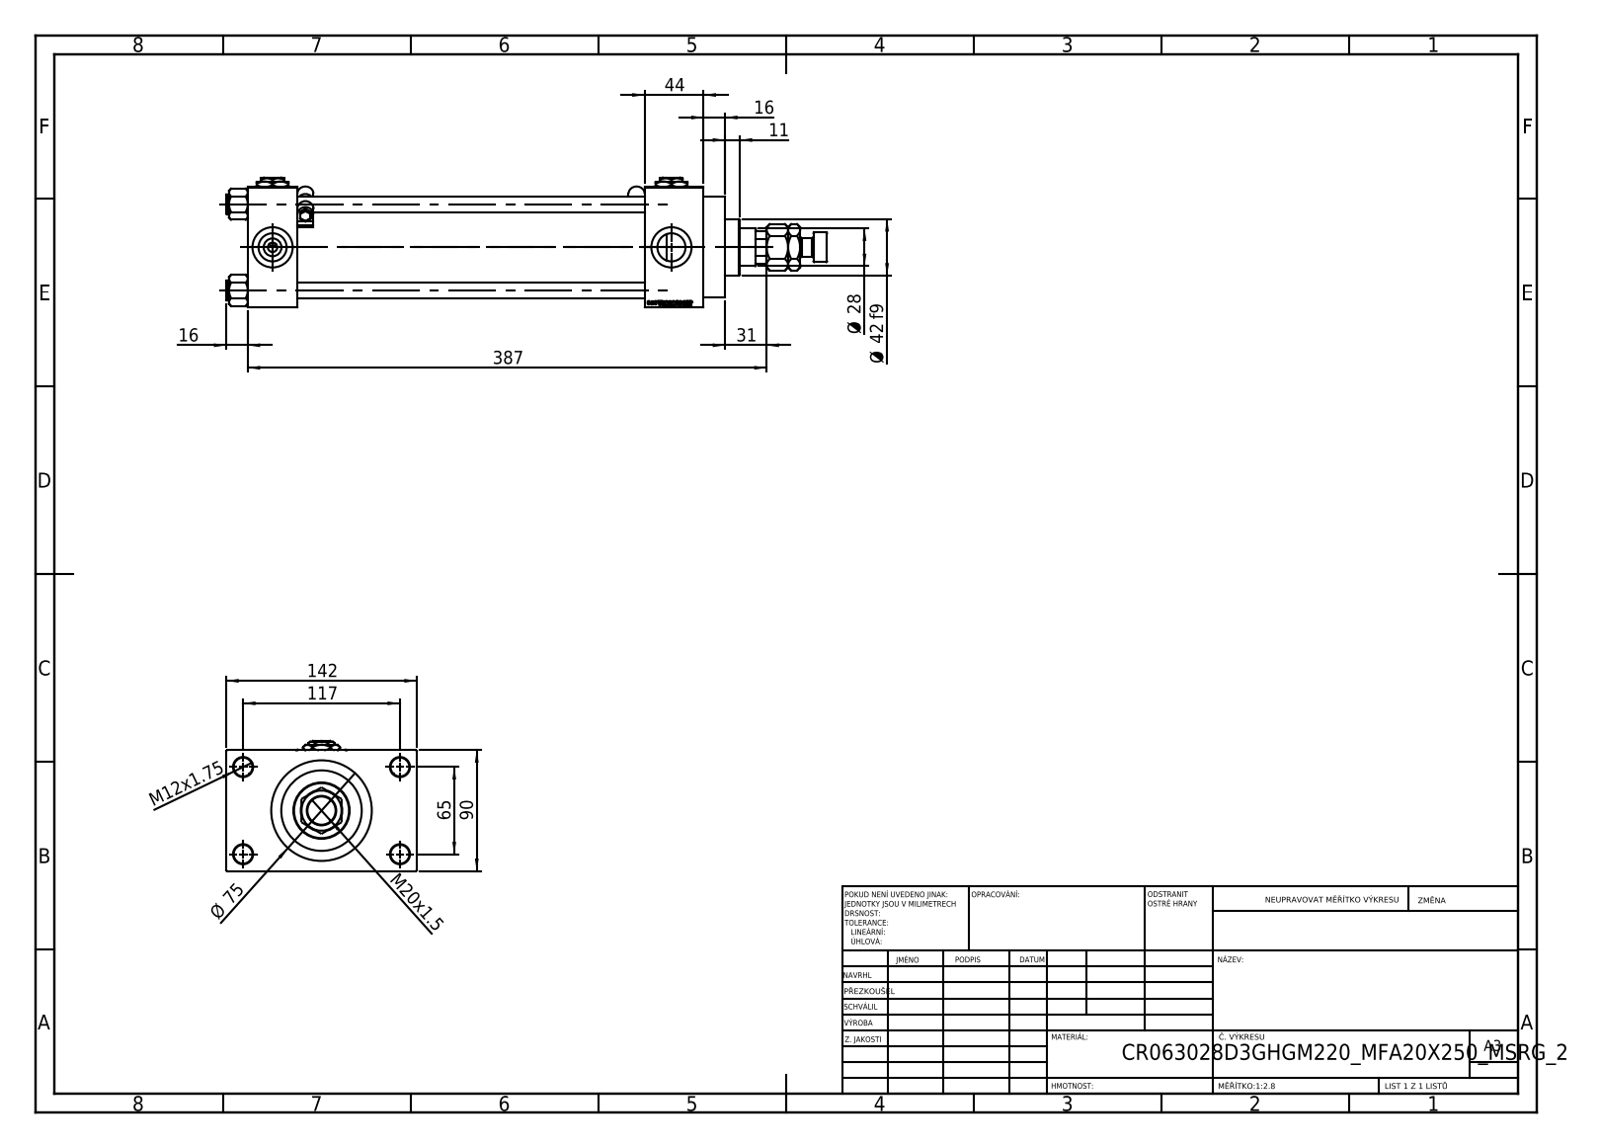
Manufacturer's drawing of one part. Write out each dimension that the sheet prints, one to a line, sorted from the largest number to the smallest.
387
142
117
90
Ø 75
65
44
Ø 42 f9
31
Ø 28
M20x1.5
16
16
M12x1.75
11
